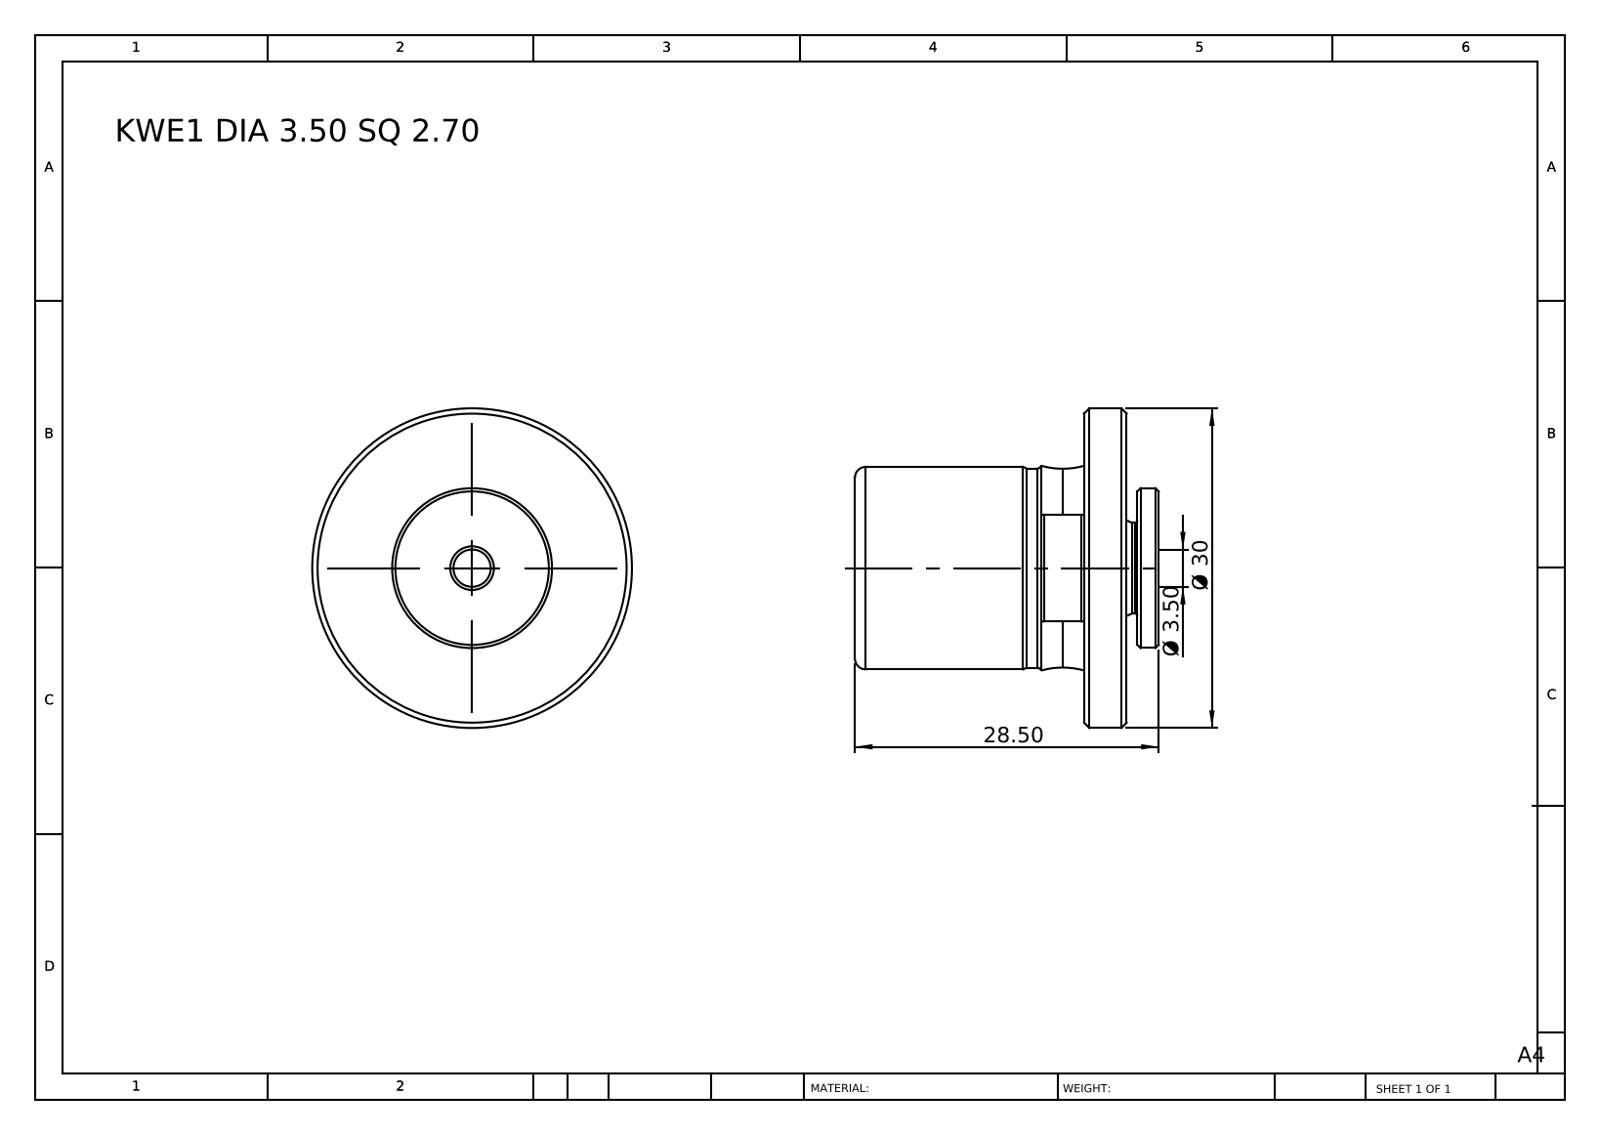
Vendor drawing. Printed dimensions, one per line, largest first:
Ø 30
28.50
Ø 3.50
